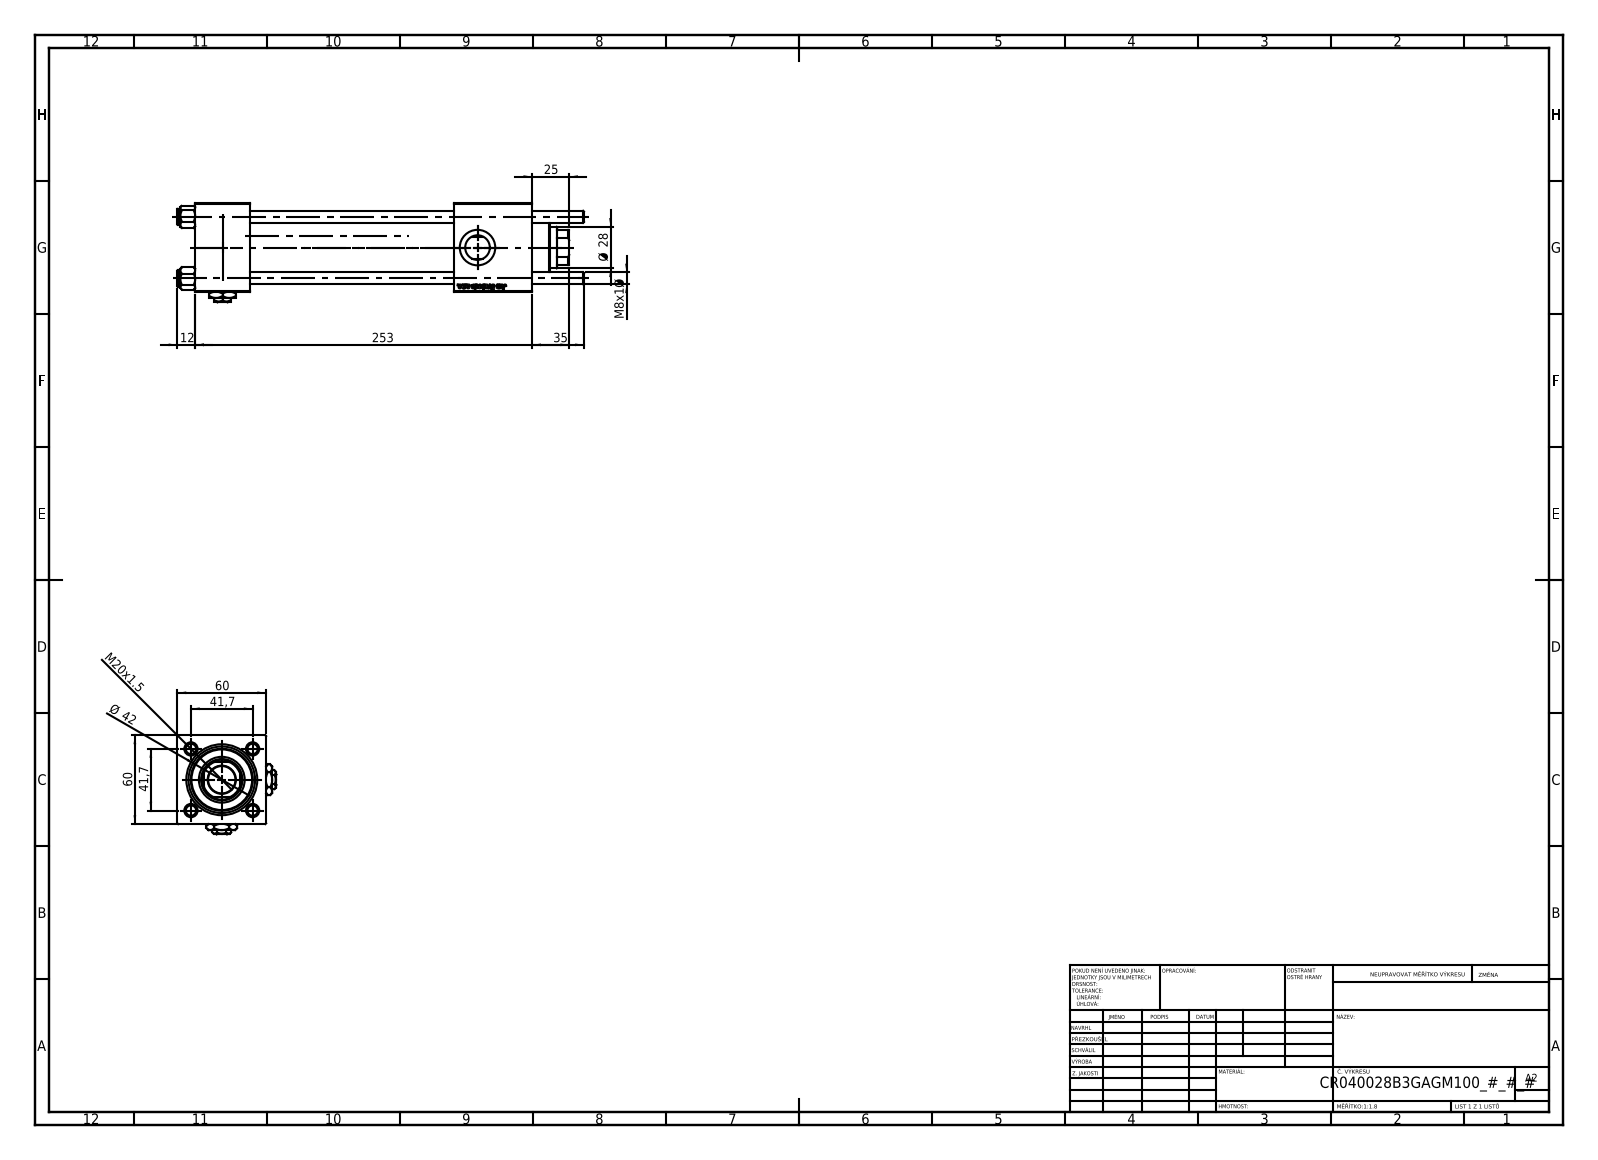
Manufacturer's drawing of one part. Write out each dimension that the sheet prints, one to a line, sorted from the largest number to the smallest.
253
60
60
Ø 42
41,7
41,7
35
Ø 28
25
M20x1.5
12
M8x1 Ø
